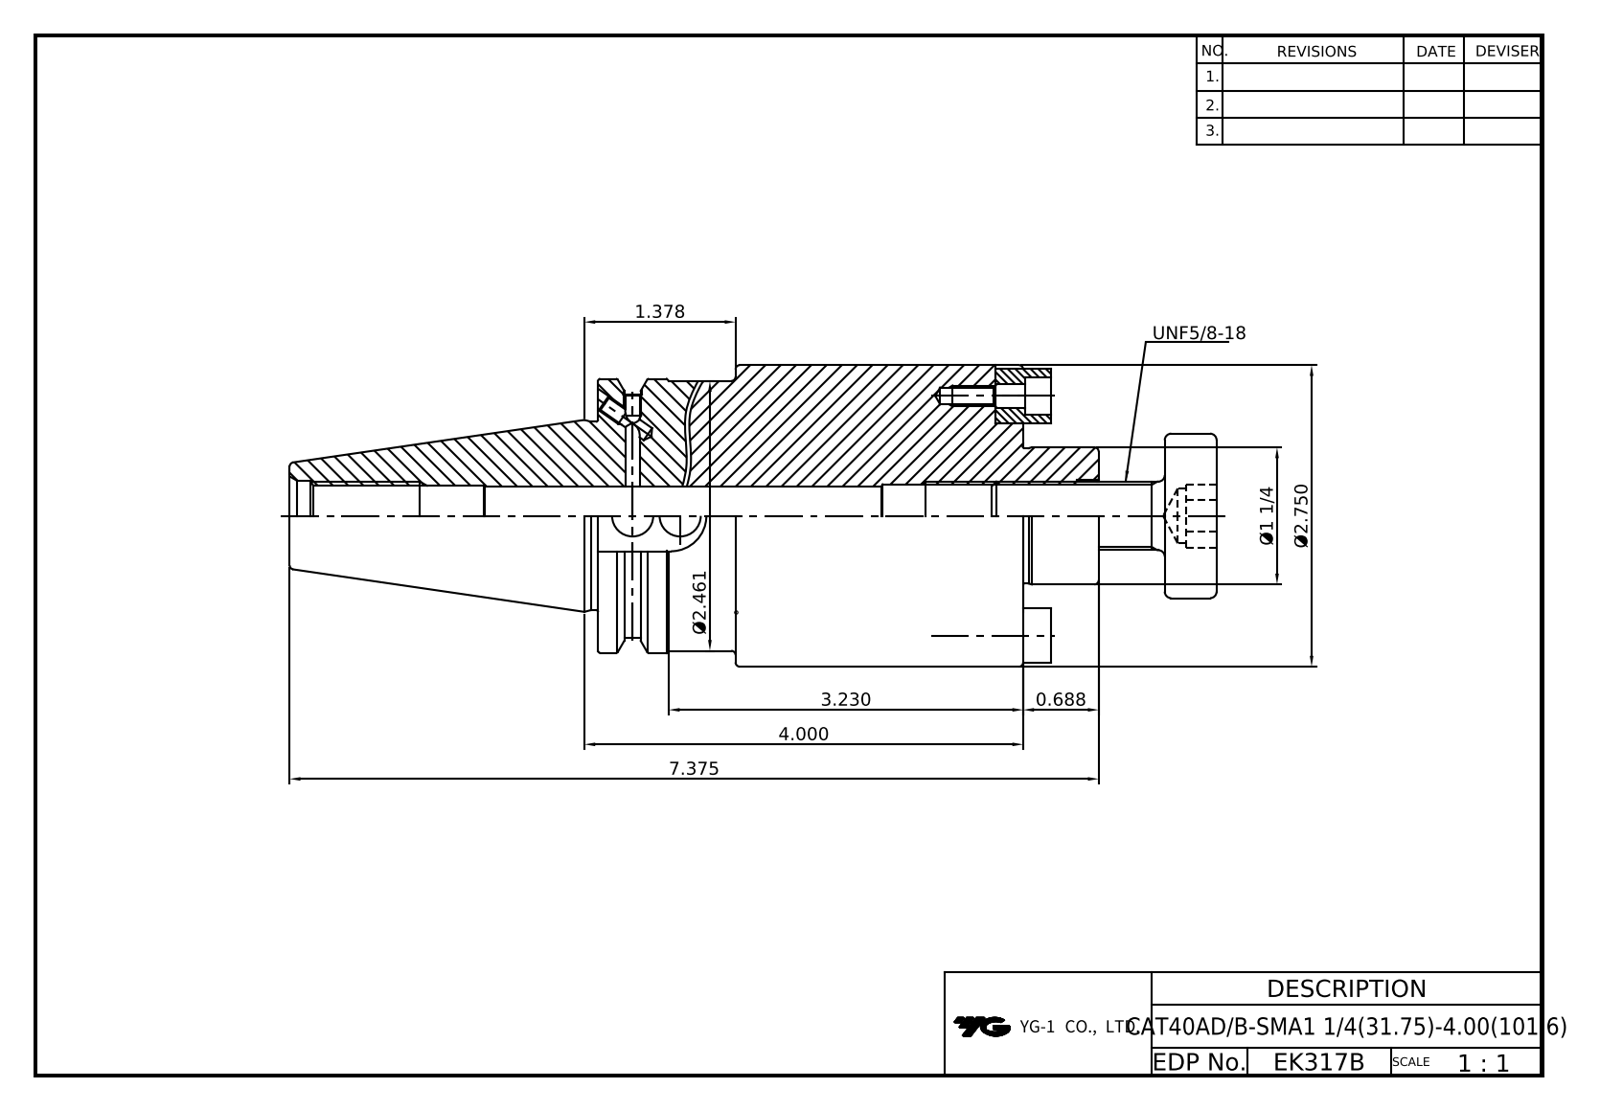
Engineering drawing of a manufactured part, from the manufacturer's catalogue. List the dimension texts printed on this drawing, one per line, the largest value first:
7.375
4.000
3.230
Ø2.750
Ø2.461
1.378
Ø1 1/4
0.688
